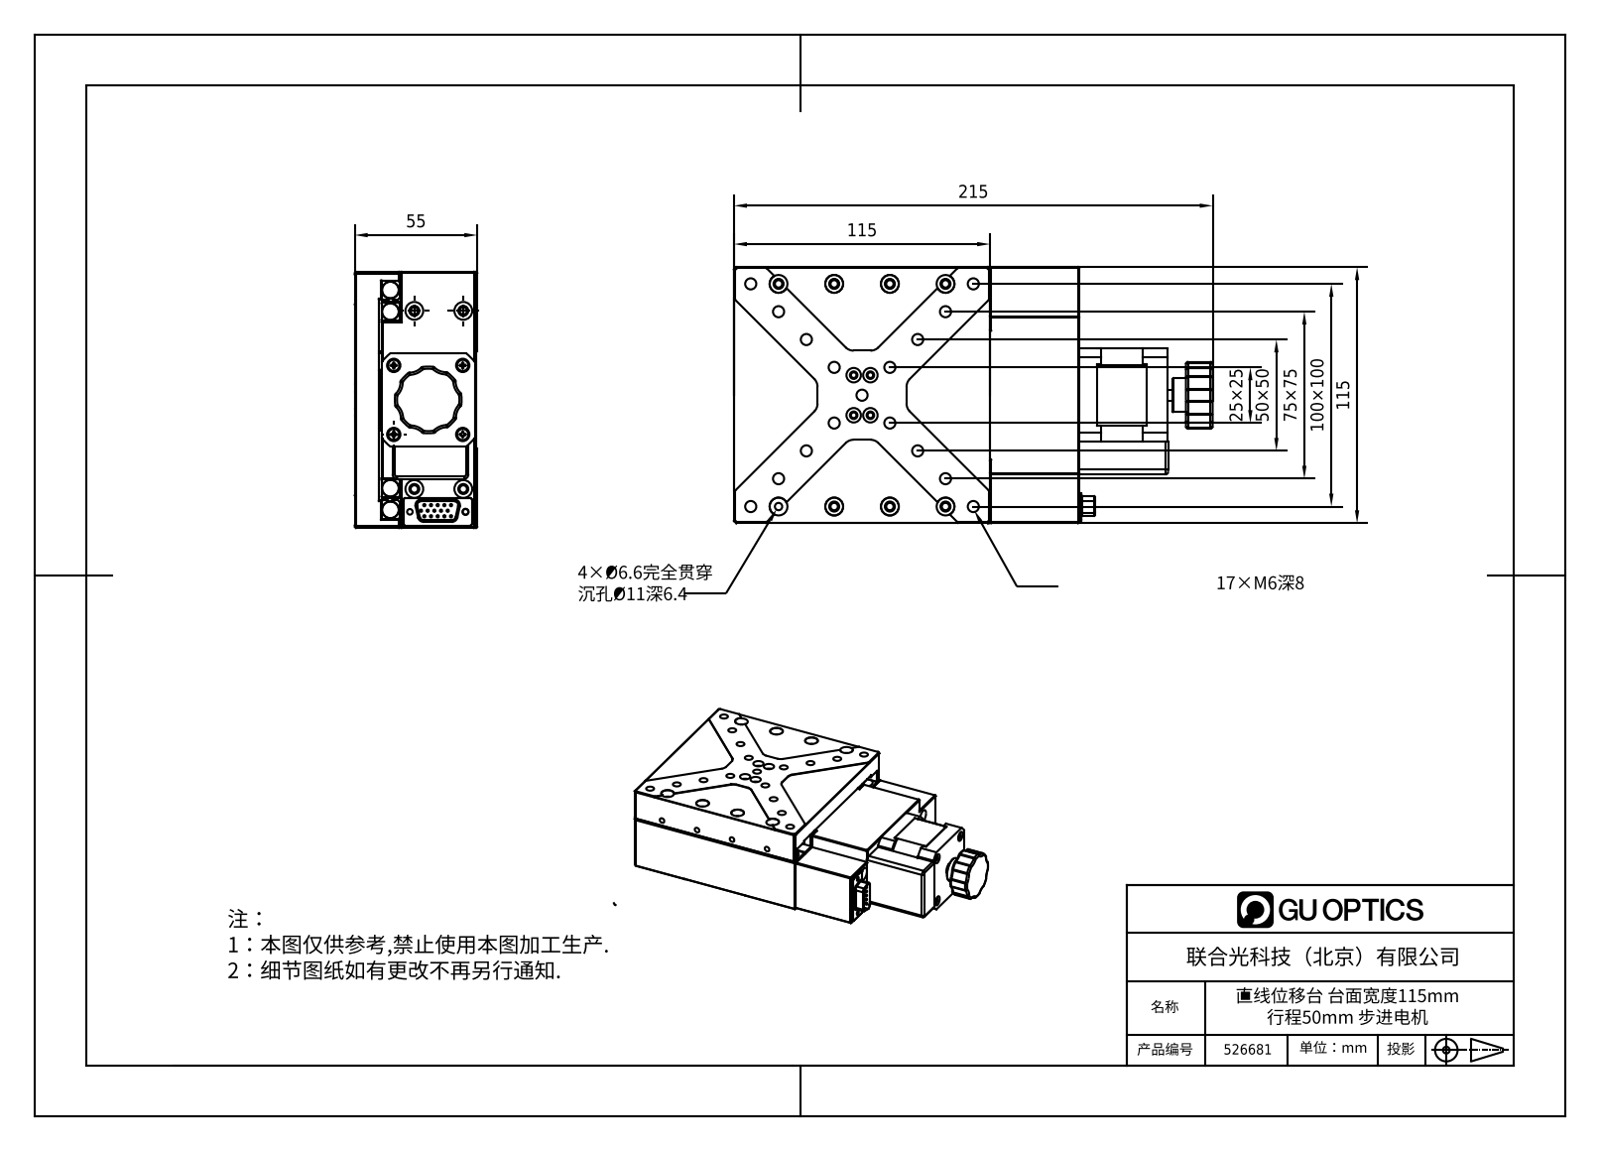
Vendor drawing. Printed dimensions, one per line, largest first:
215
115
115
100×100
75×75
55
50×50
25×25
